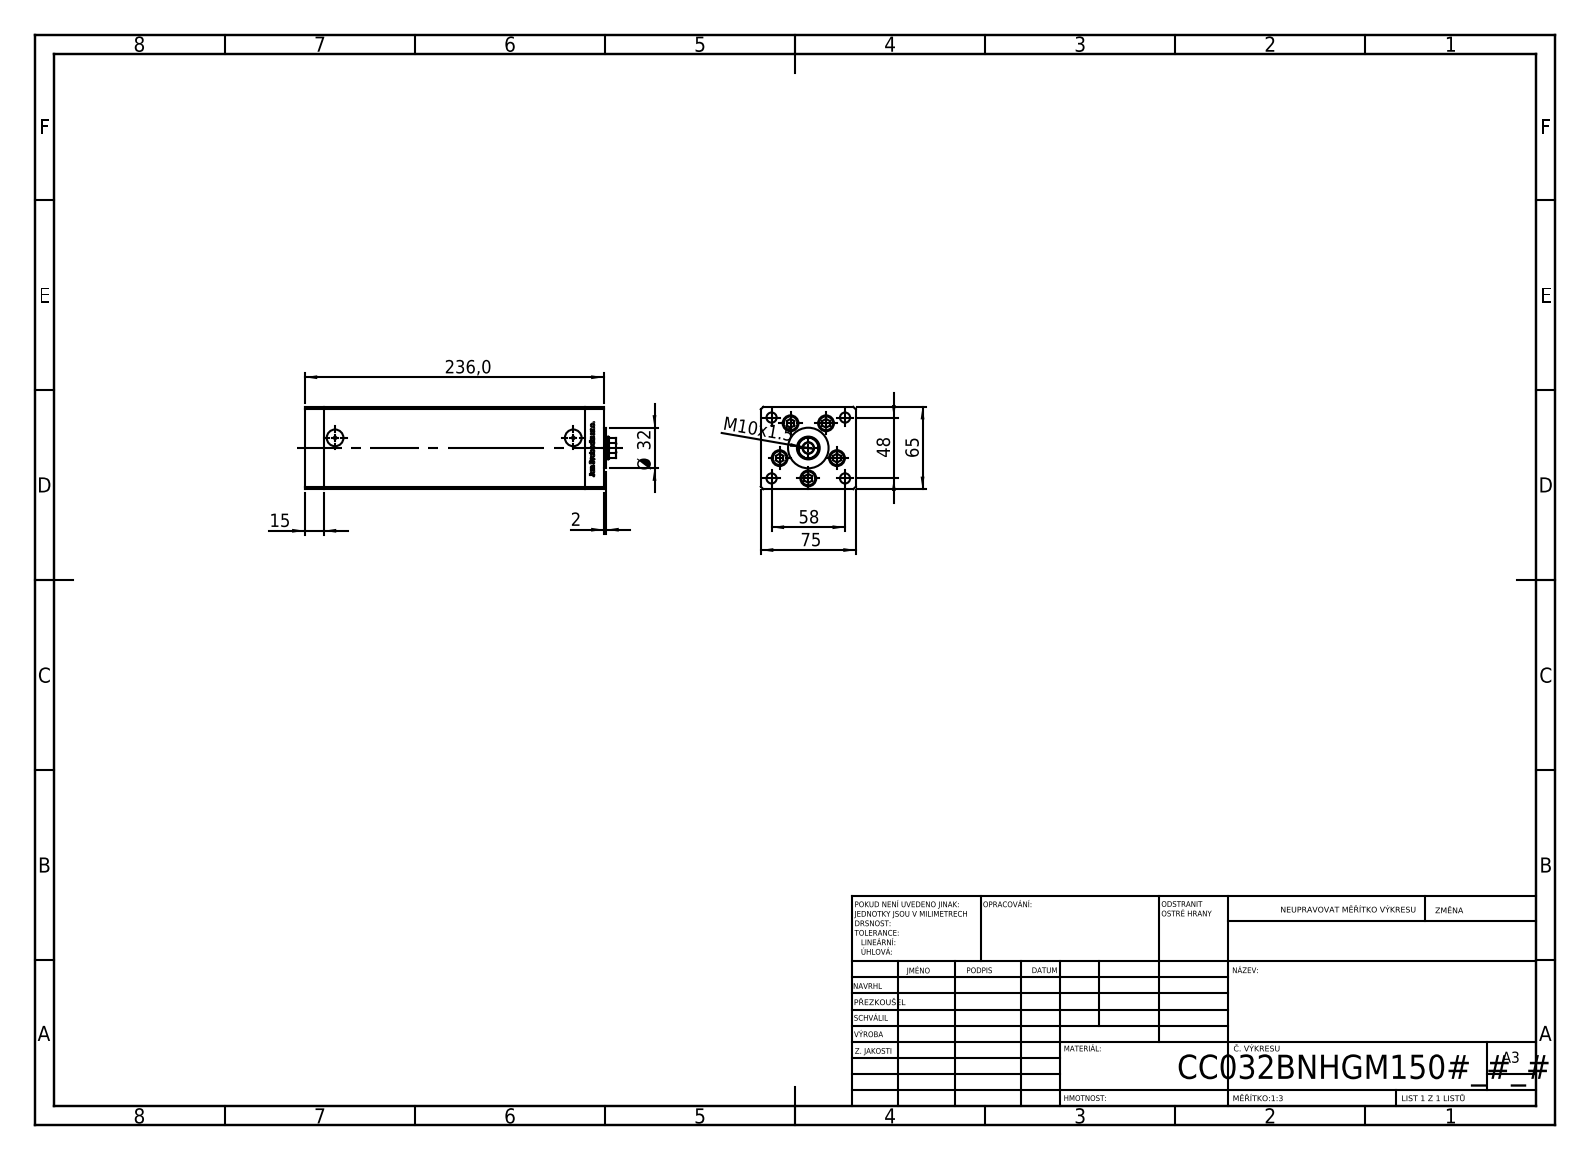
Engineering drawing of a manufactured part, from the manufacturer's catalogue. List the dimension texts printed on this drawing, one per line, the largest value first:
236,0
75
65
58
48
Ø 32
15
M10x1.5
2
